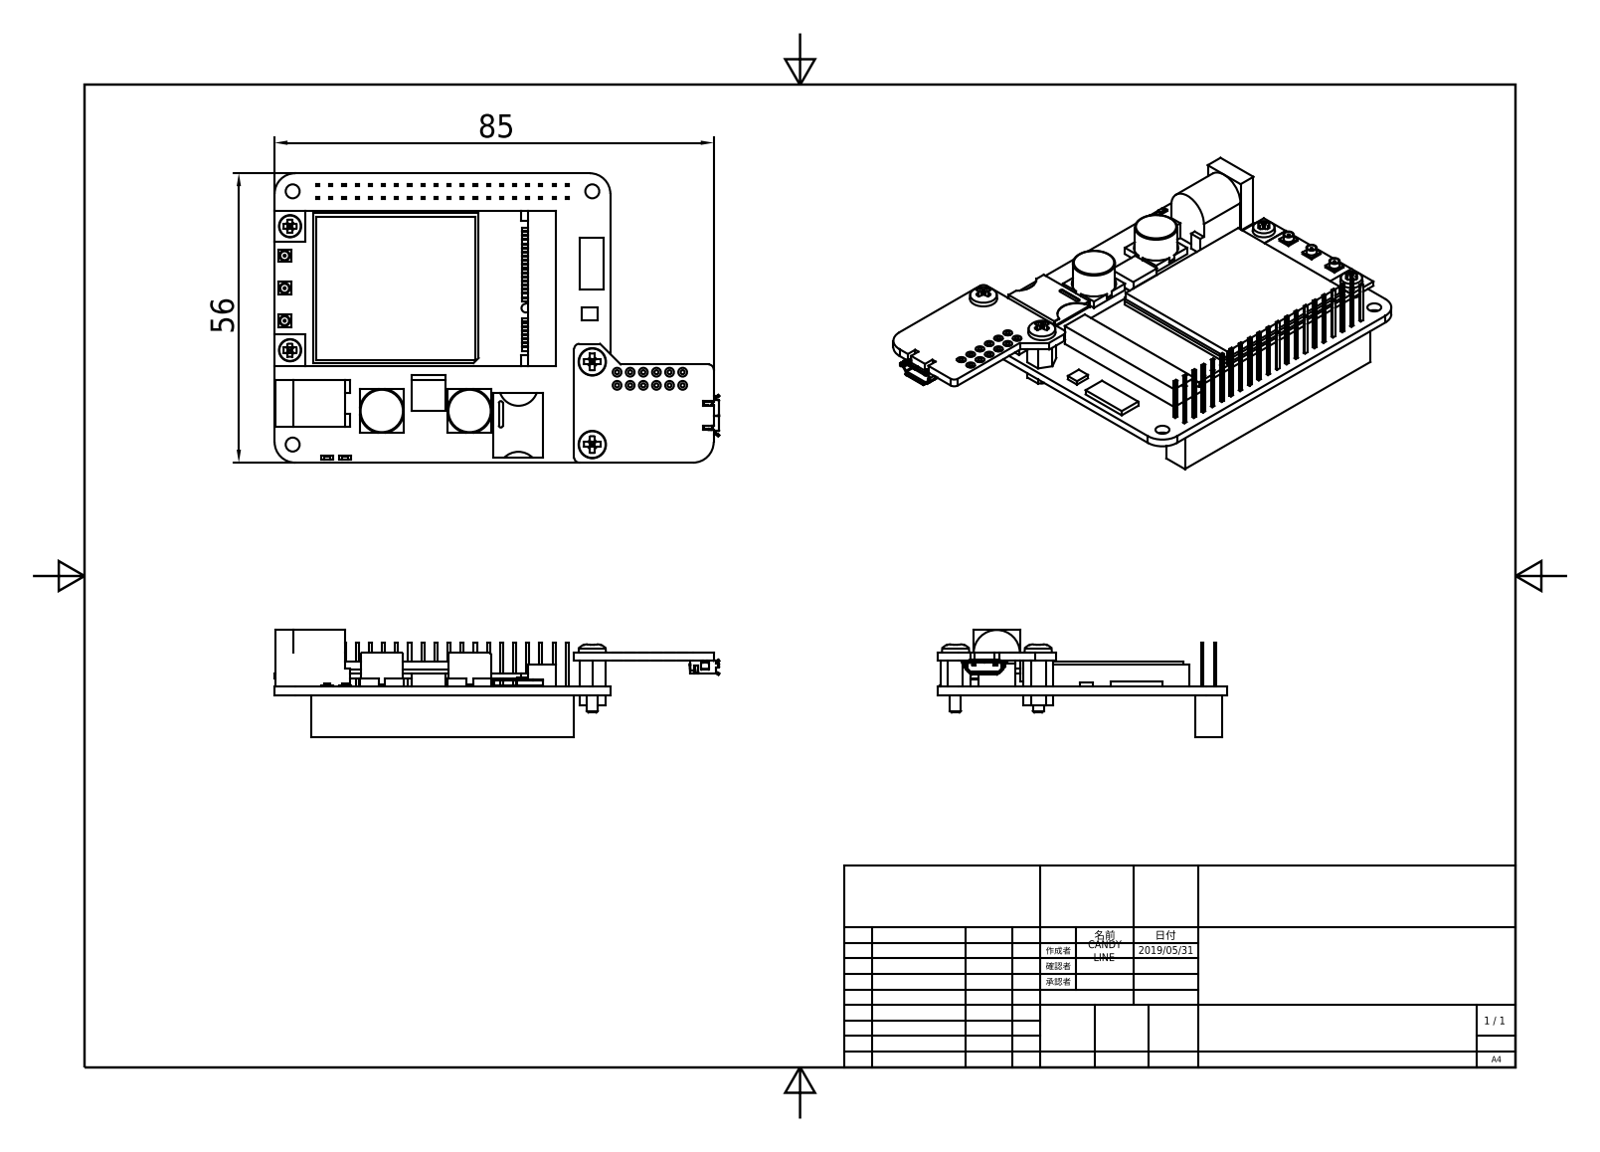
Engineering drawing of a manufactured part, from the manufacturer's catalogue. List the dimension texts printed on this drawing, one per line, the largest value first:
85
56
